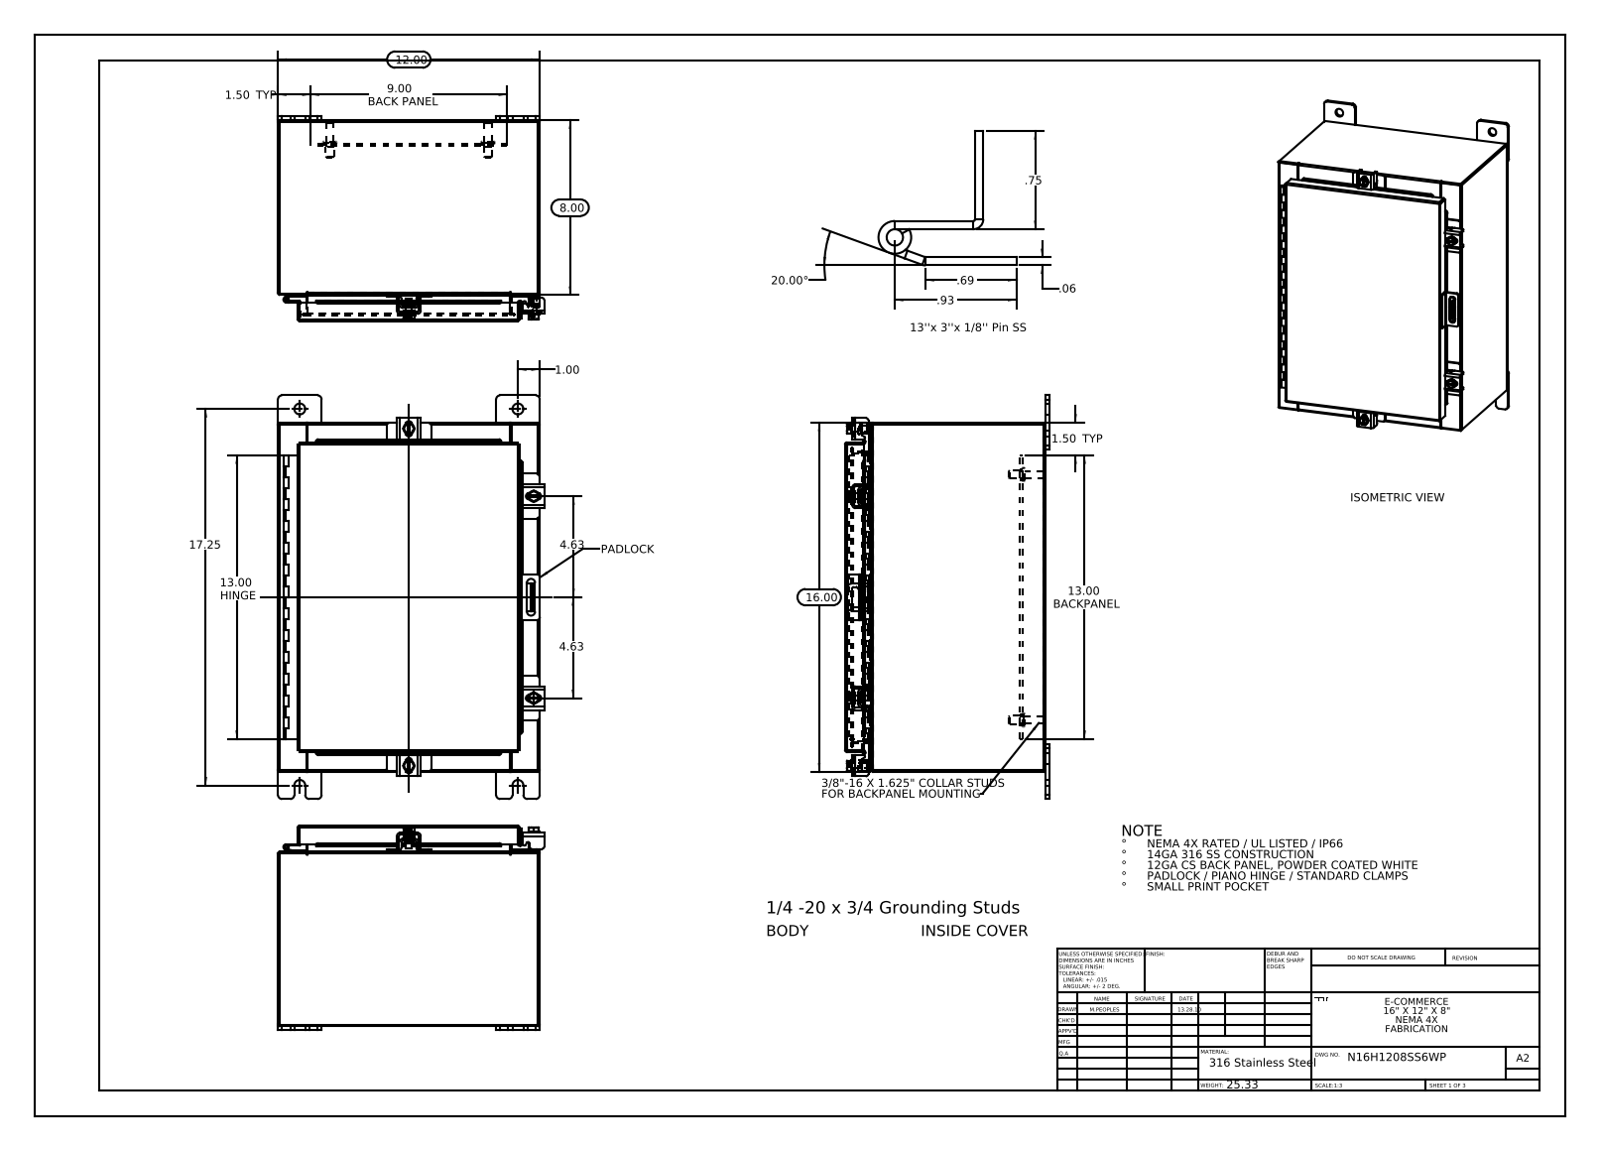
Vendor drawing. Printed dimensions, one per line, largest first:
20.00°
17.25
16.00
13.00 HINGE
13.00 BACKPANEL
12.00
9.00 BACK PANEL
8.00
4.63
4.63
1.50 TYP
1.50 TYP
1.00
.93
.75
.69
.06
